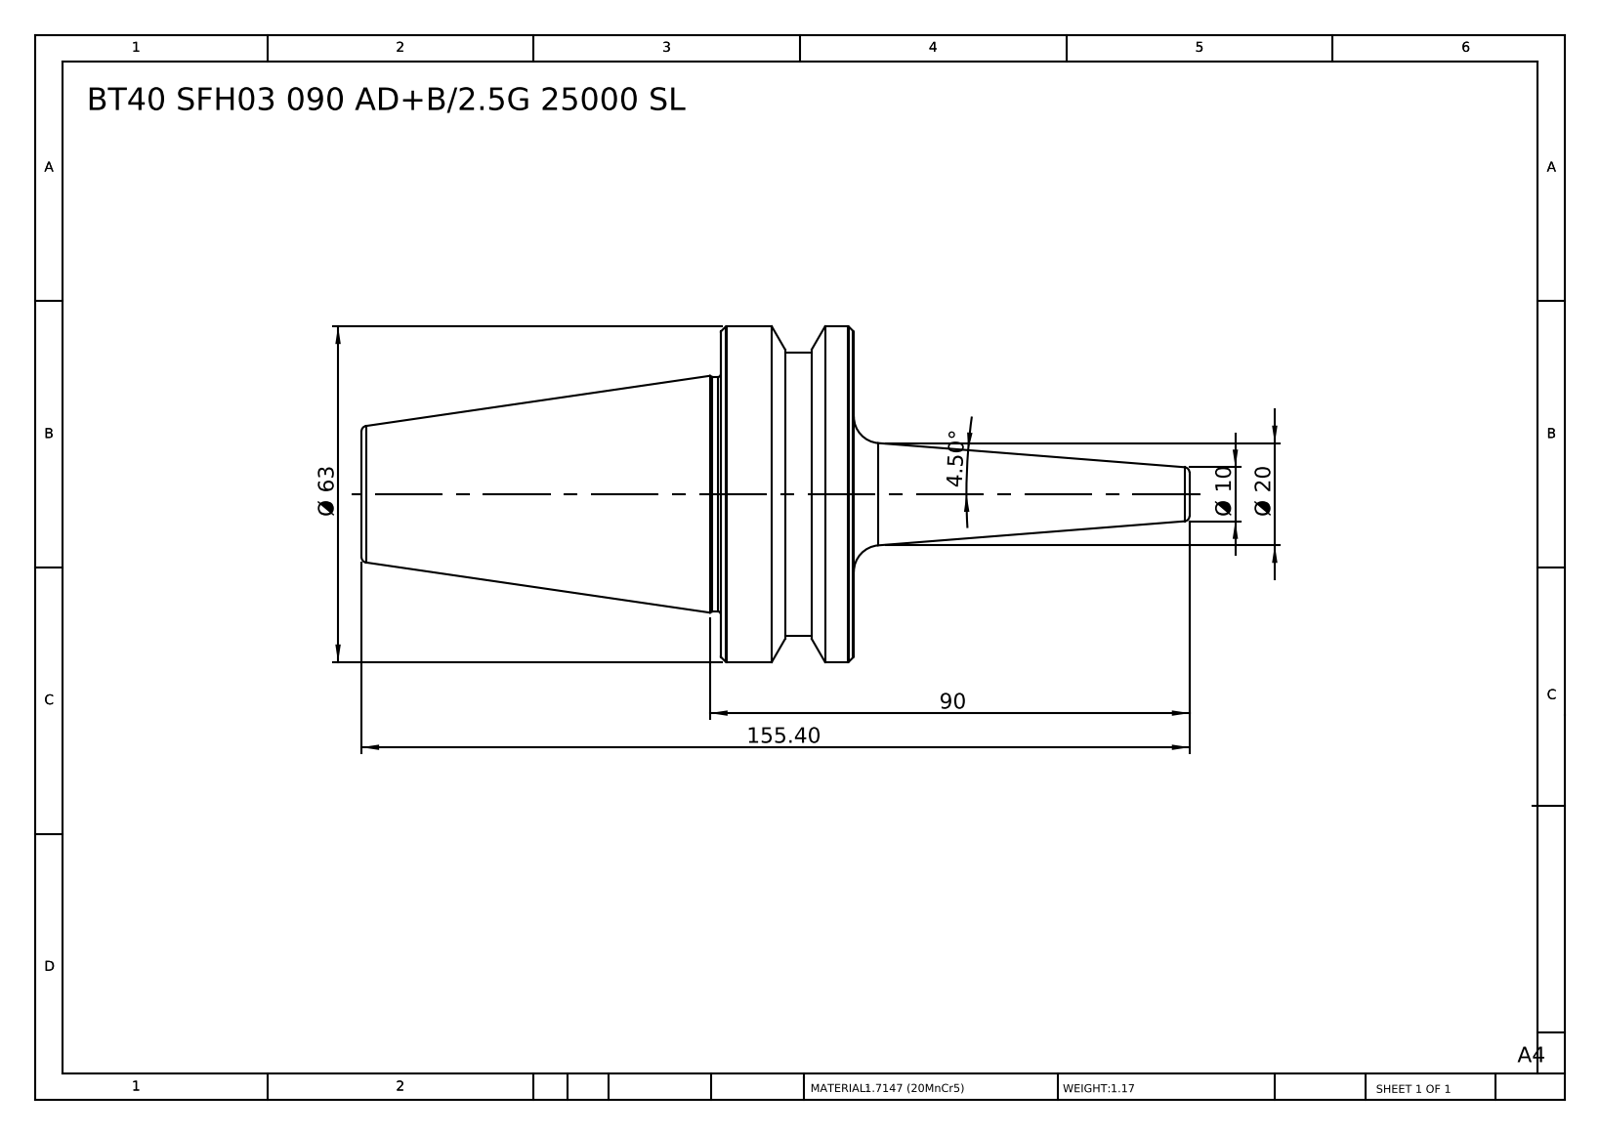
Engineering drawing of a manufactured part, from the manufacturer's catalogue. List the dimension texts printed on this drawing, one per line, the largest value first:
155.40
90
Ø 63
Ø 20
Ø 10
4.50°
